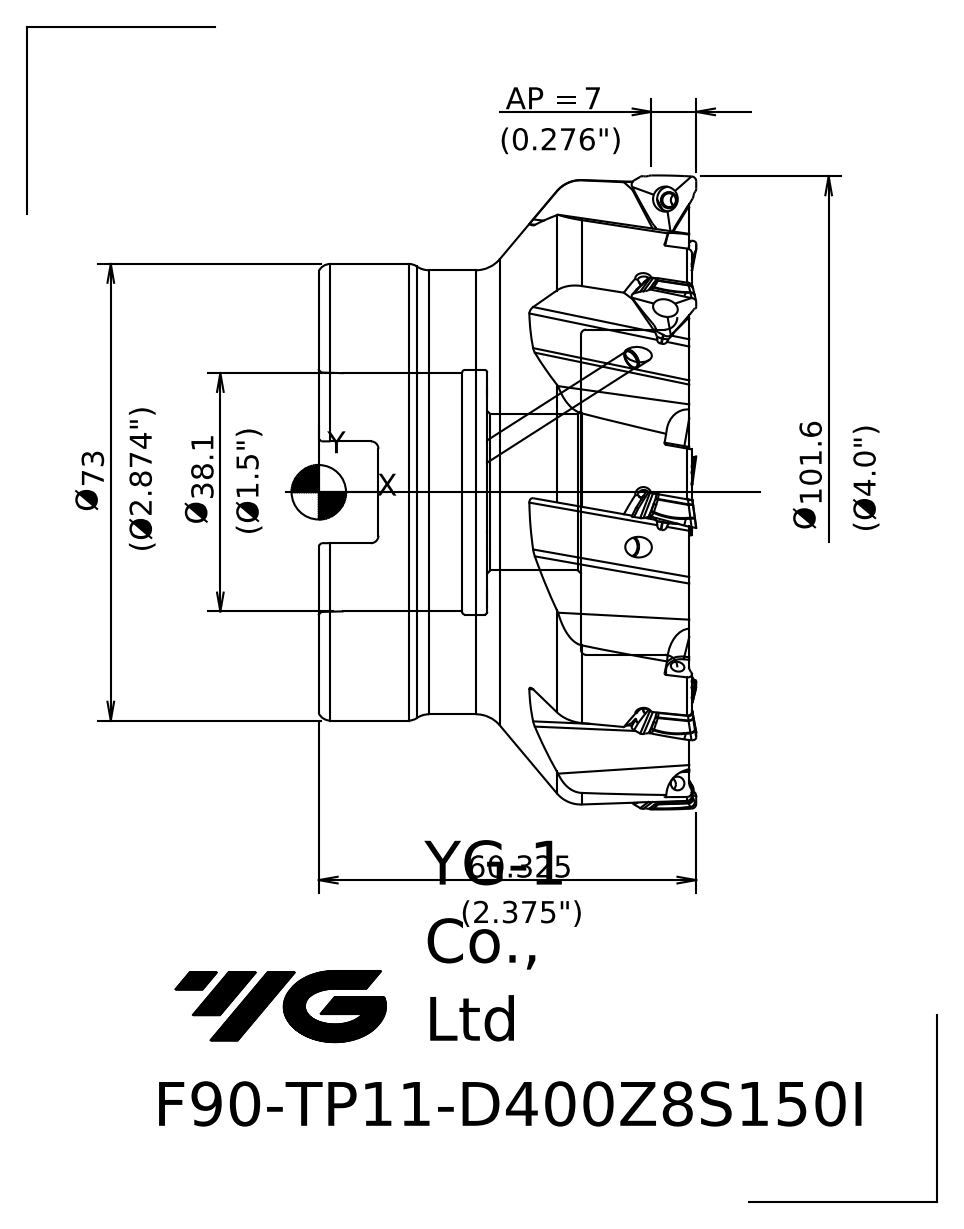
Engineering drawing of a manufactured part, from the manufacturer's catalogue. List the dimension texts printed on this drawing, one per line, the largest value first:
101.6 Ø
60.325
38.1 Ø
AP = 7
